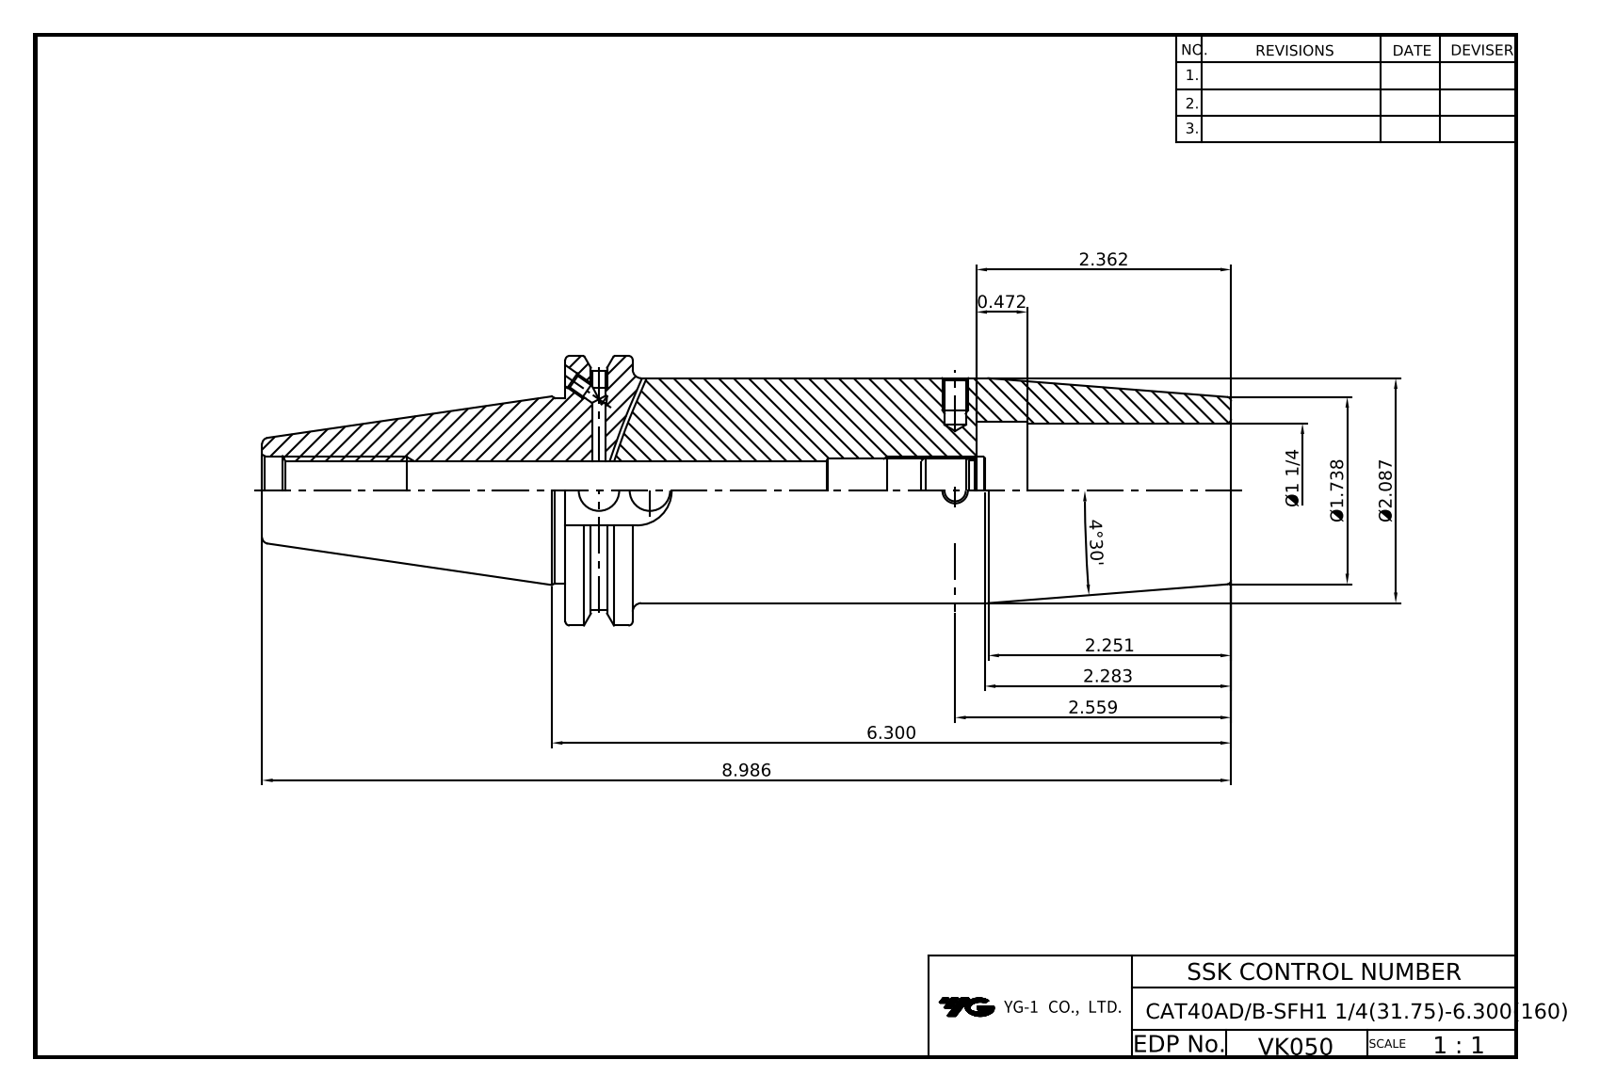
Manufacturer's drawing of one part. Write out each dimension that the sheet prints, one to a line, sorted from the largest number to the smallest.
8.986
6.300
4°30'
2.559
2.362
2.283
2.251
Ø2.087
Ø1.738
Ø1 1/4
0.472
